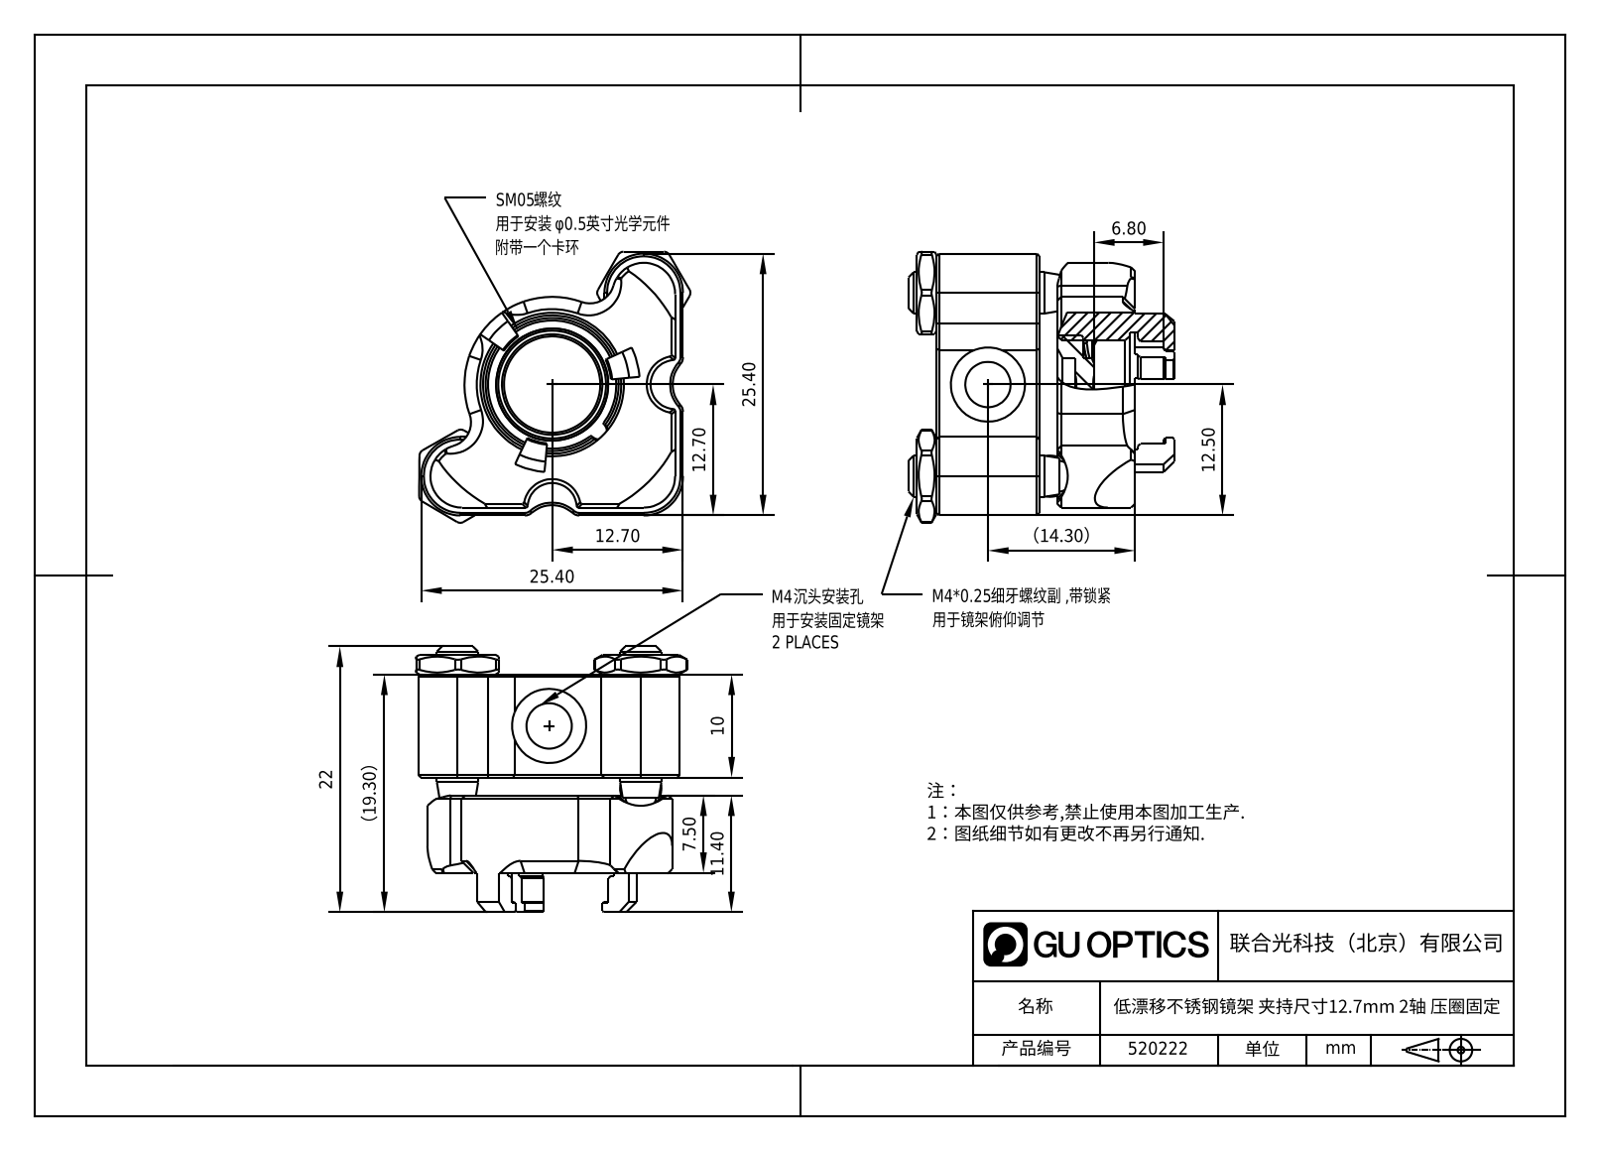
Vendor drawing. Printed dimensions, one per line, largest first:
25.40
25.40
22
（19.30）
（14.30）
12.70
12.70
12.50
11.40
10
7.50
6.80
